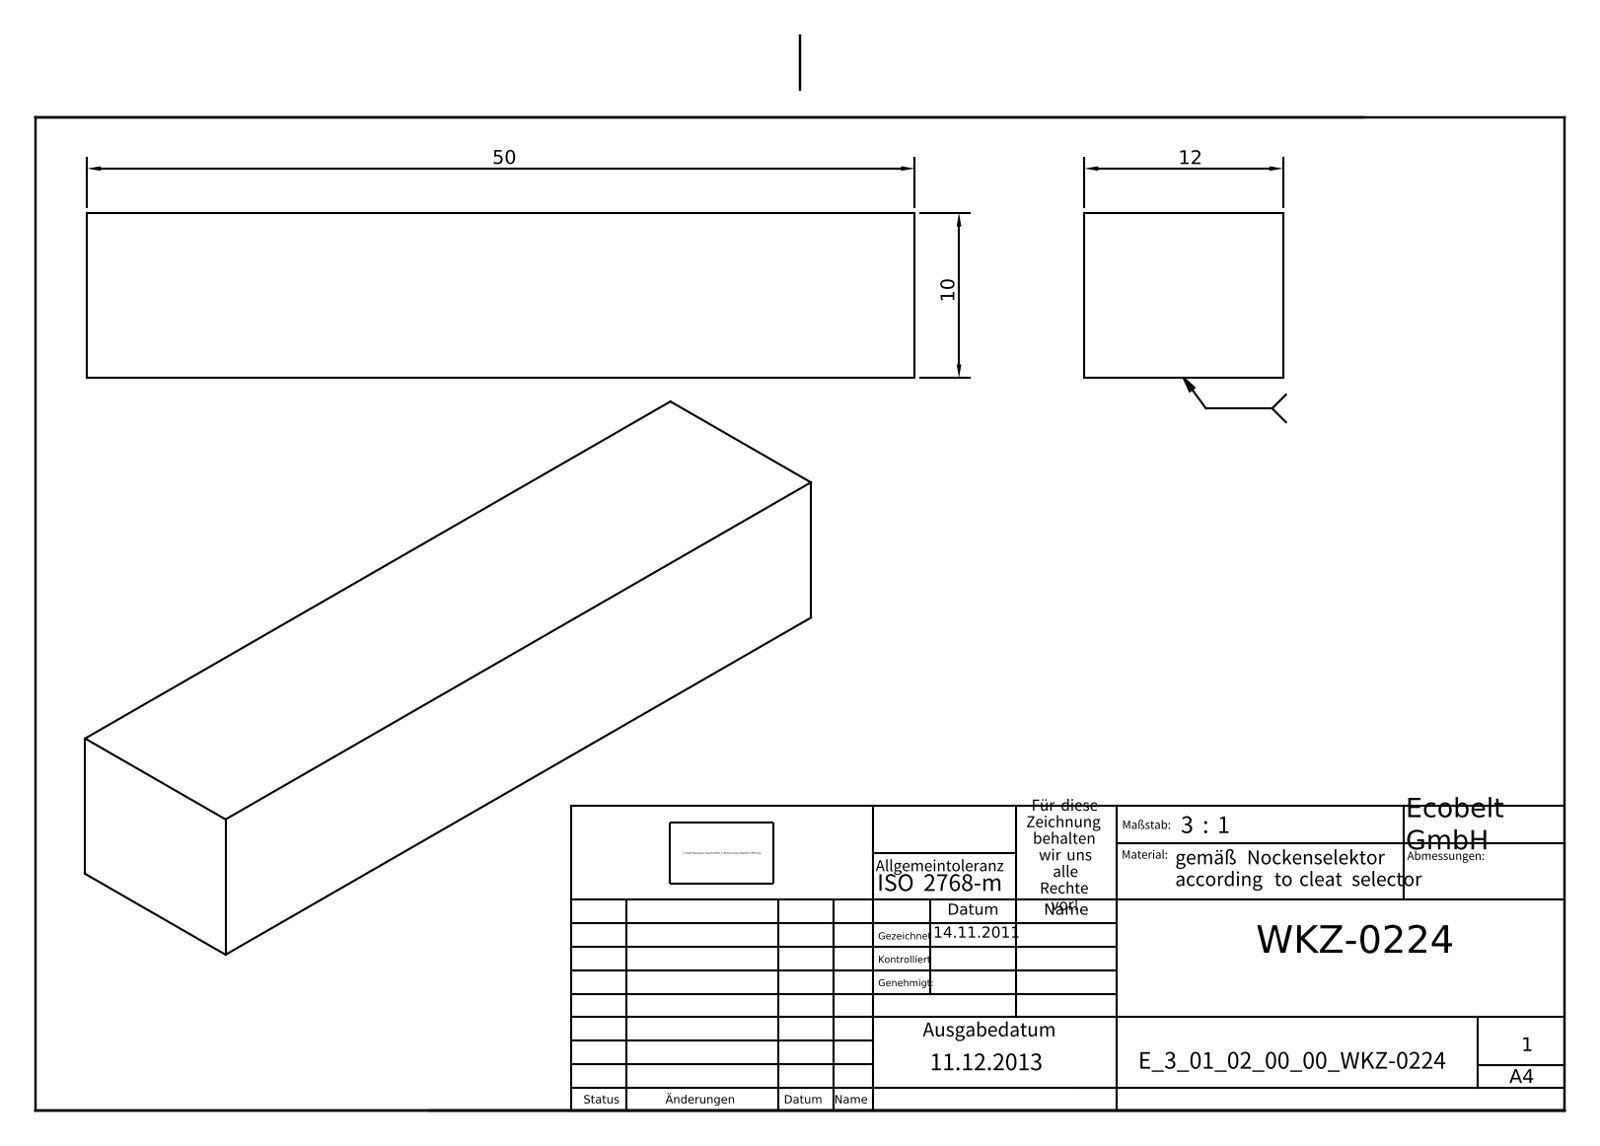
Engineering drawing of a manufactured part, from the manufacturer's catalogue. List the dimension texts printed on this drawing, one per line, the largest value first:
50
12
10
